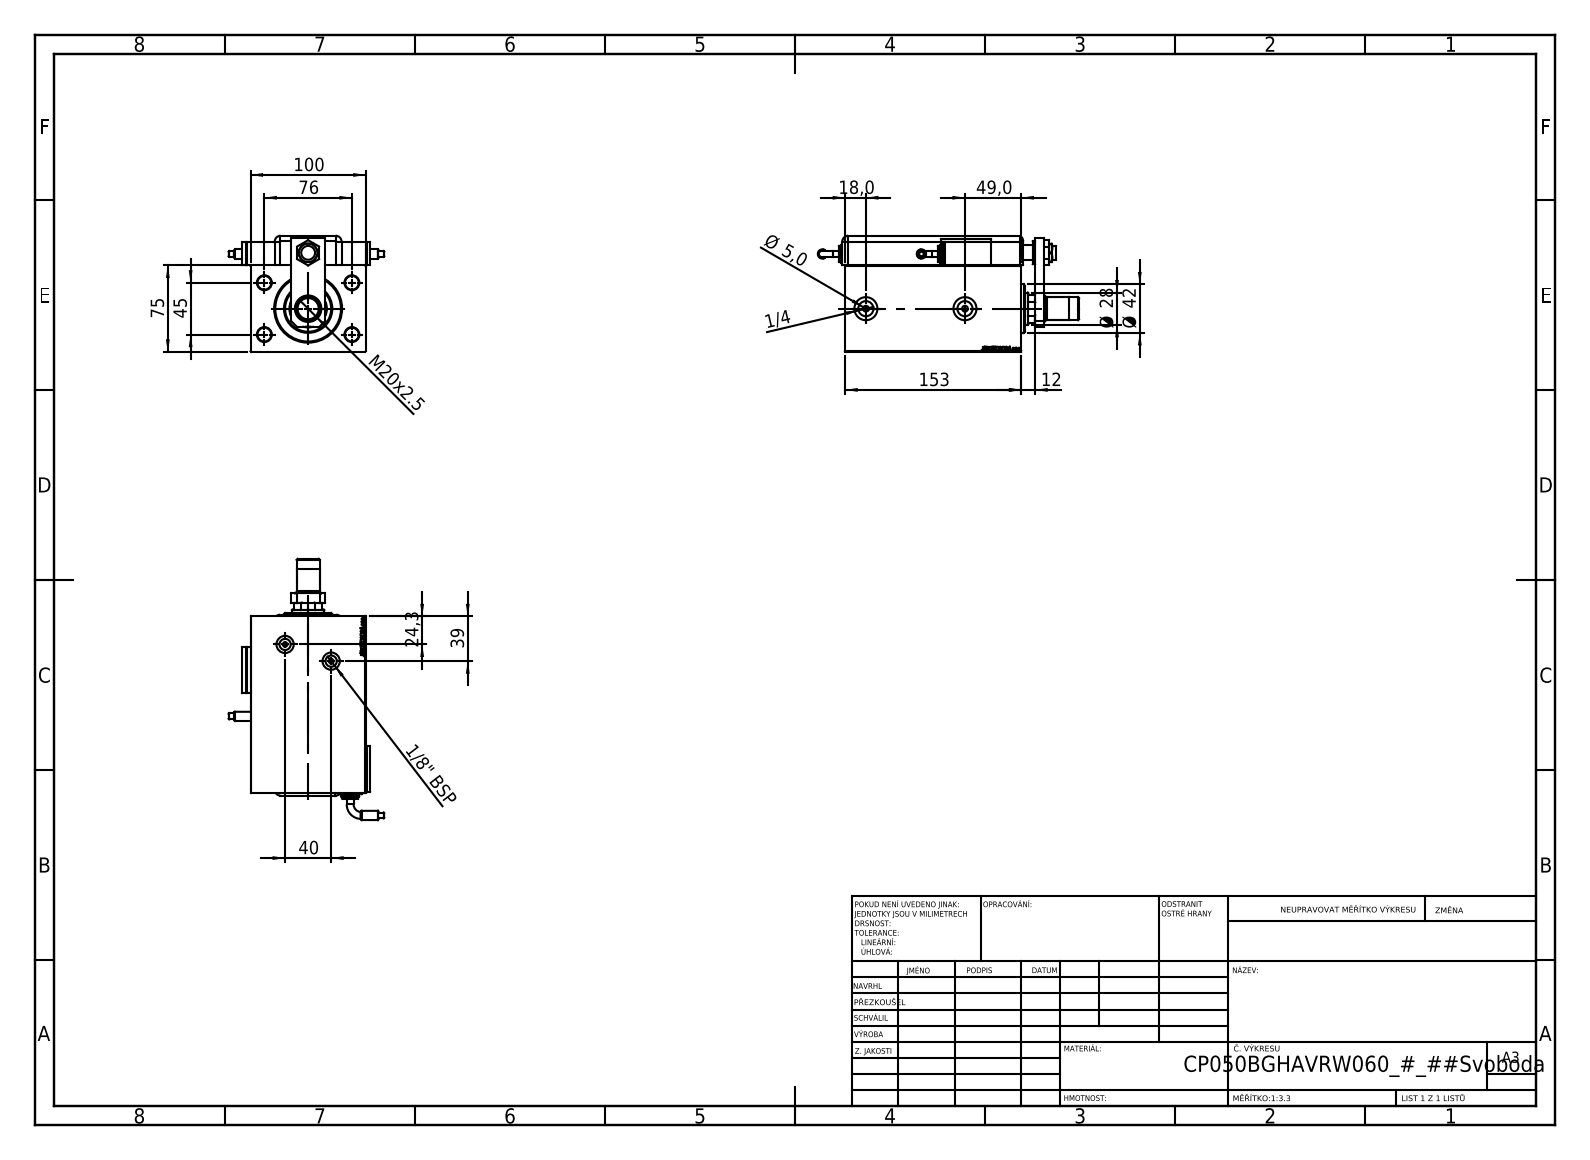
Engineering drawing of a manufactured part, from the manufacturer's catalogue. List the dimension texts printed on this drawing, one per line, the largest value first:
153
100
76
75
49,0
45
Ø 42
40
39
Ø 28
24,3
M20x2.5
18,0
12
Ø 5,0
1/4
1/8" BSP
